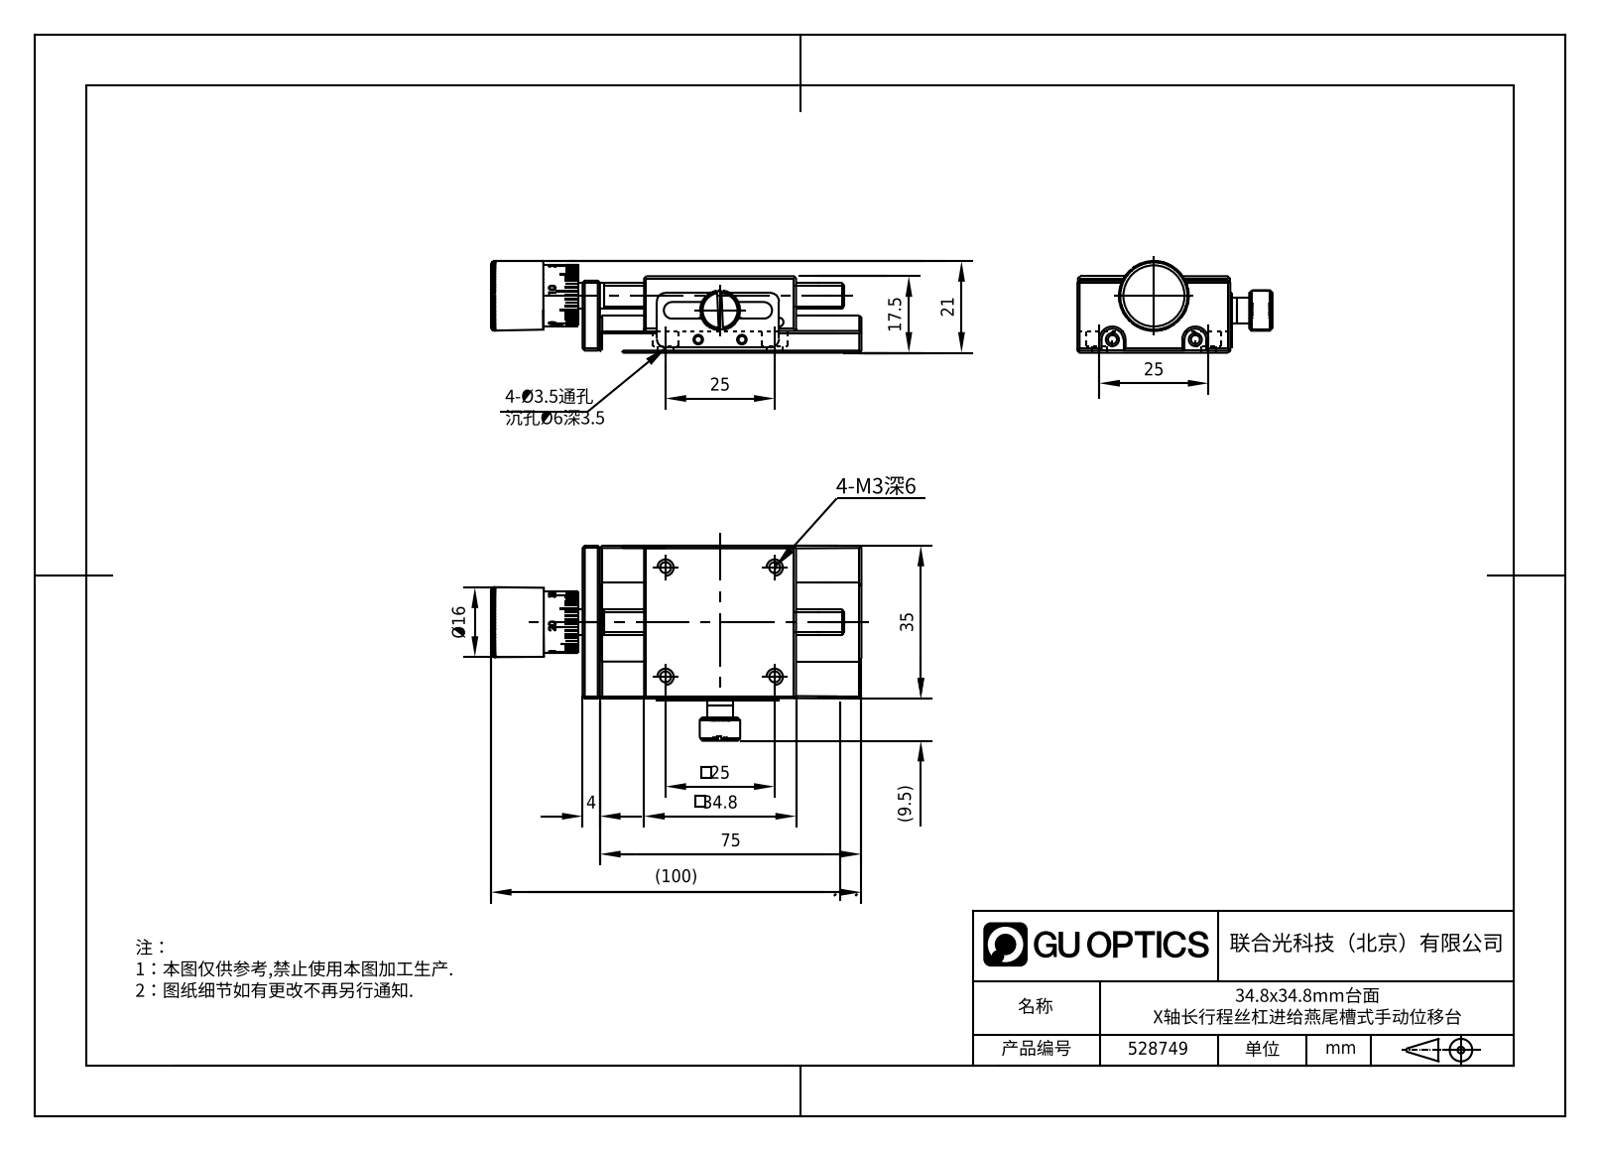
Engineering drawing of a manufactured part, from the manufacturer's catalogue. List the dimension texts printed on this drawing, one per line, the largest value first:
(100)
75
35
34.8
25
25
25
21
17.5
Ø16
(9.5)
4
